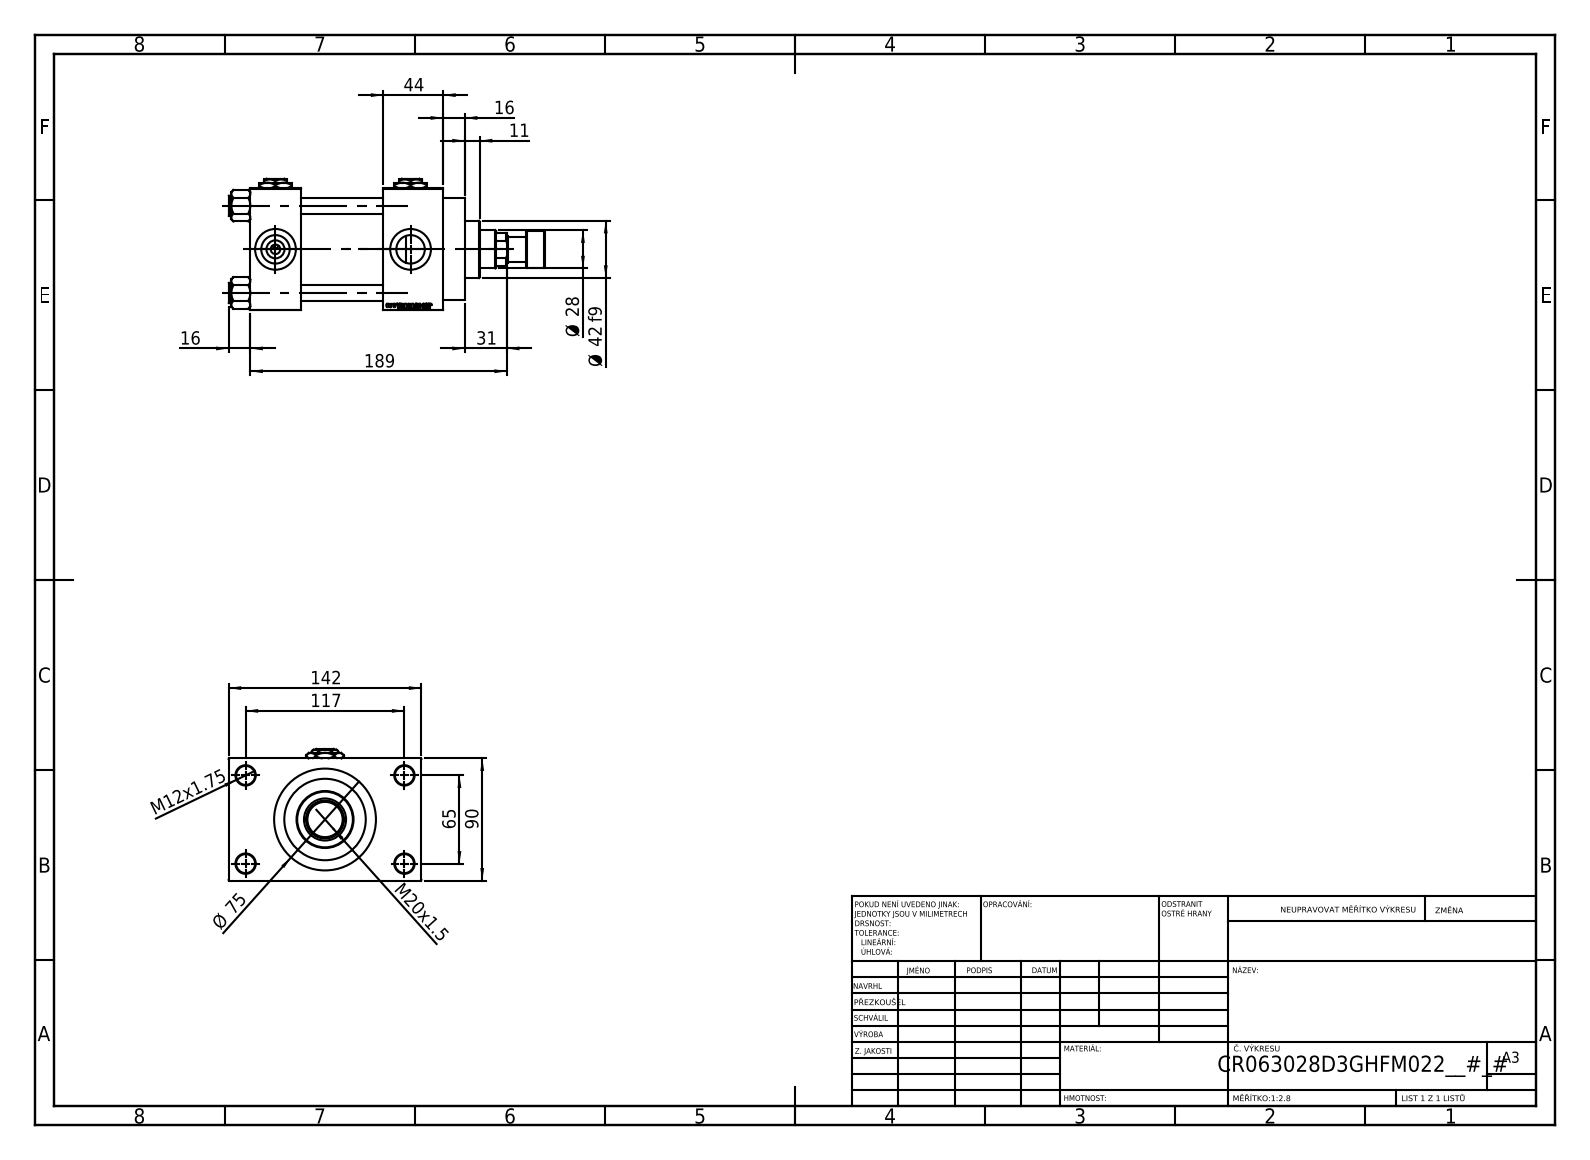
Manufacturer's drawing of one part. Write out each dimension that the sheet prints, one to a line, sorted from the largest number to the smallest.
189
142
117
90
Ø 75
65
44
Ø 42 f9
31
Ø 28
M20x1.5
16
16
M12x1.75
11
